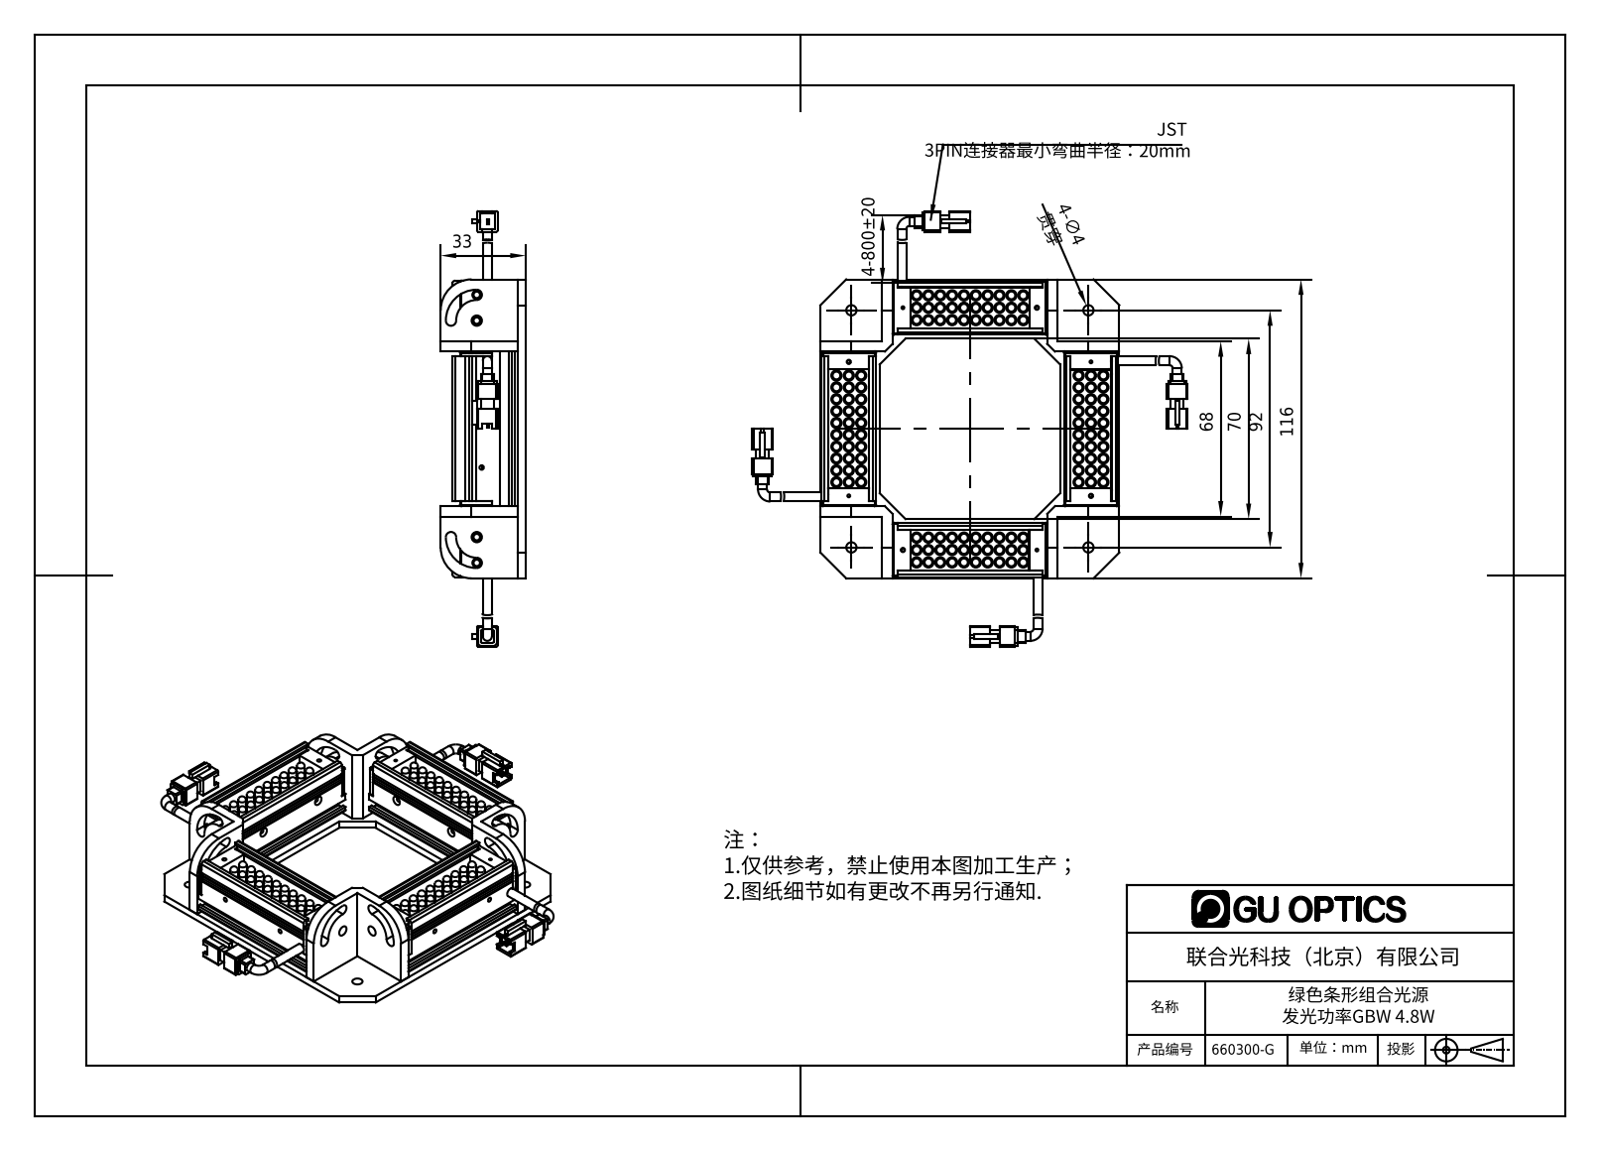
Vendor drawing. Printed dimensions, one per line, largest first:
116
92
70
68
33
4-800±20
4-∅4 贯穿
